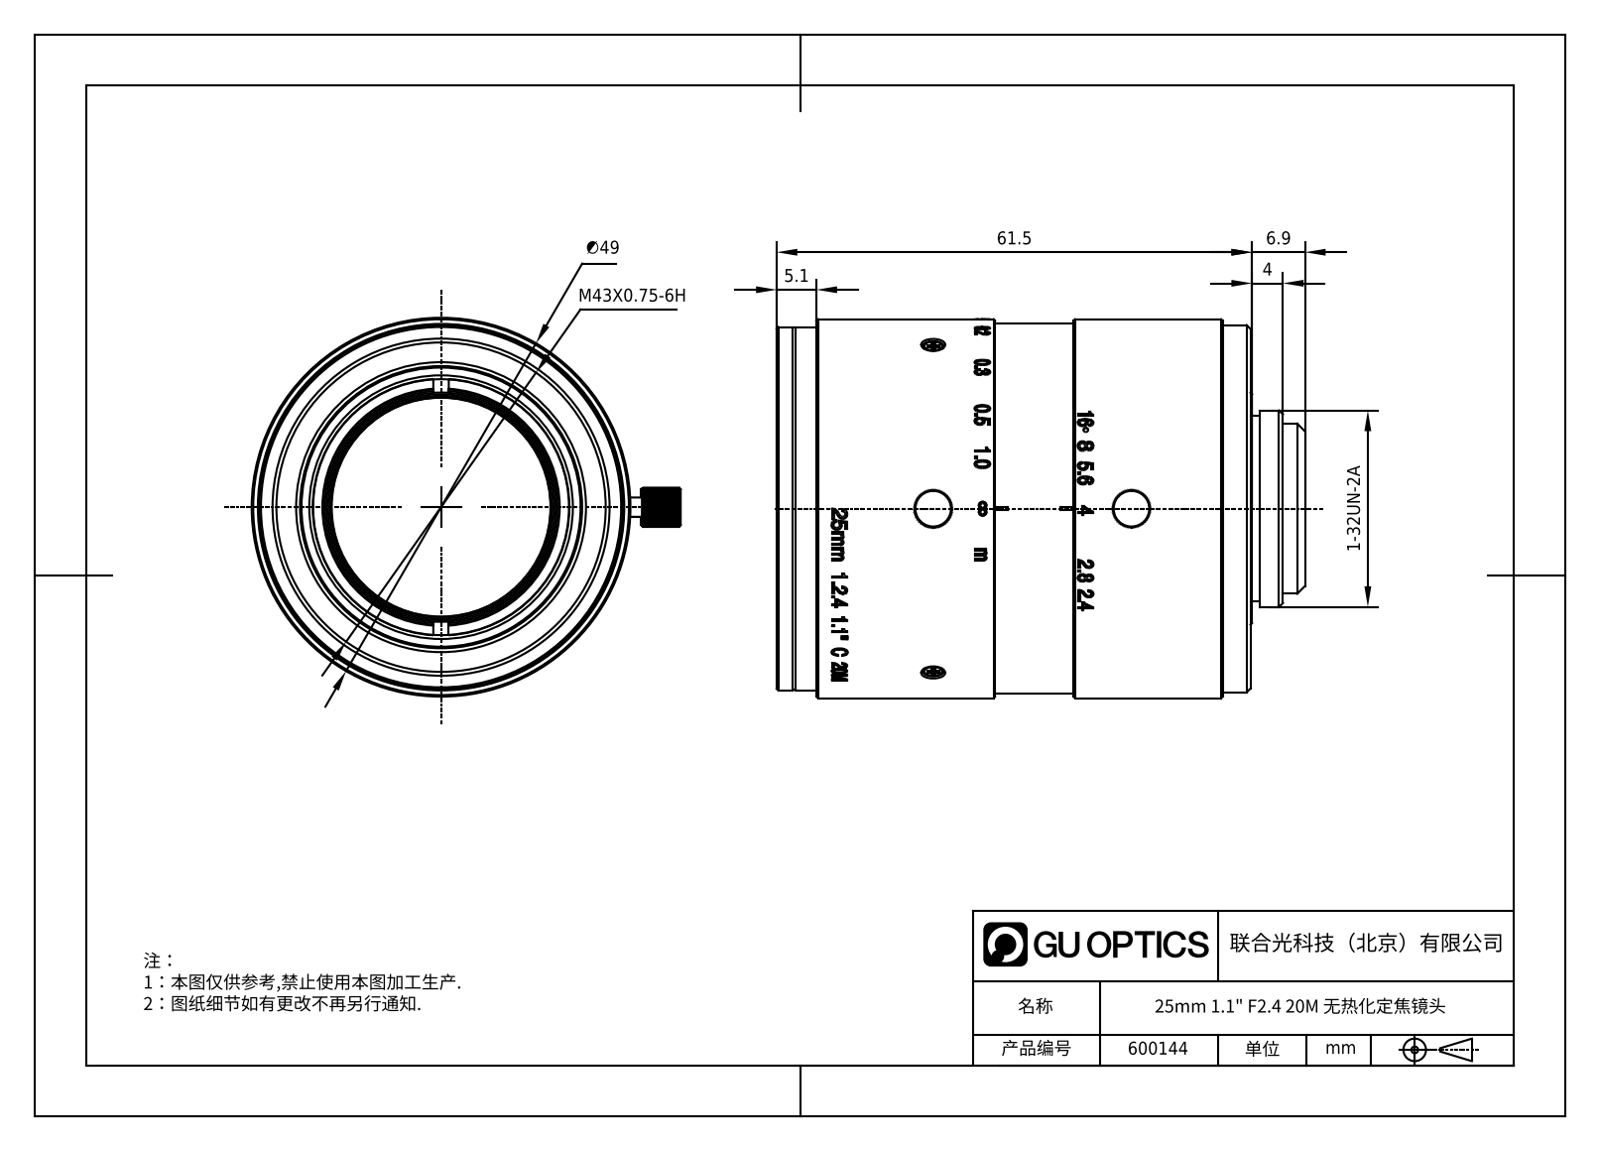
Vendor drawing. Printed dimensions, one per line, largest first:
61.5
∅49
M43X0.75-6H
6.9
5.1
4
1-32UN-2A
